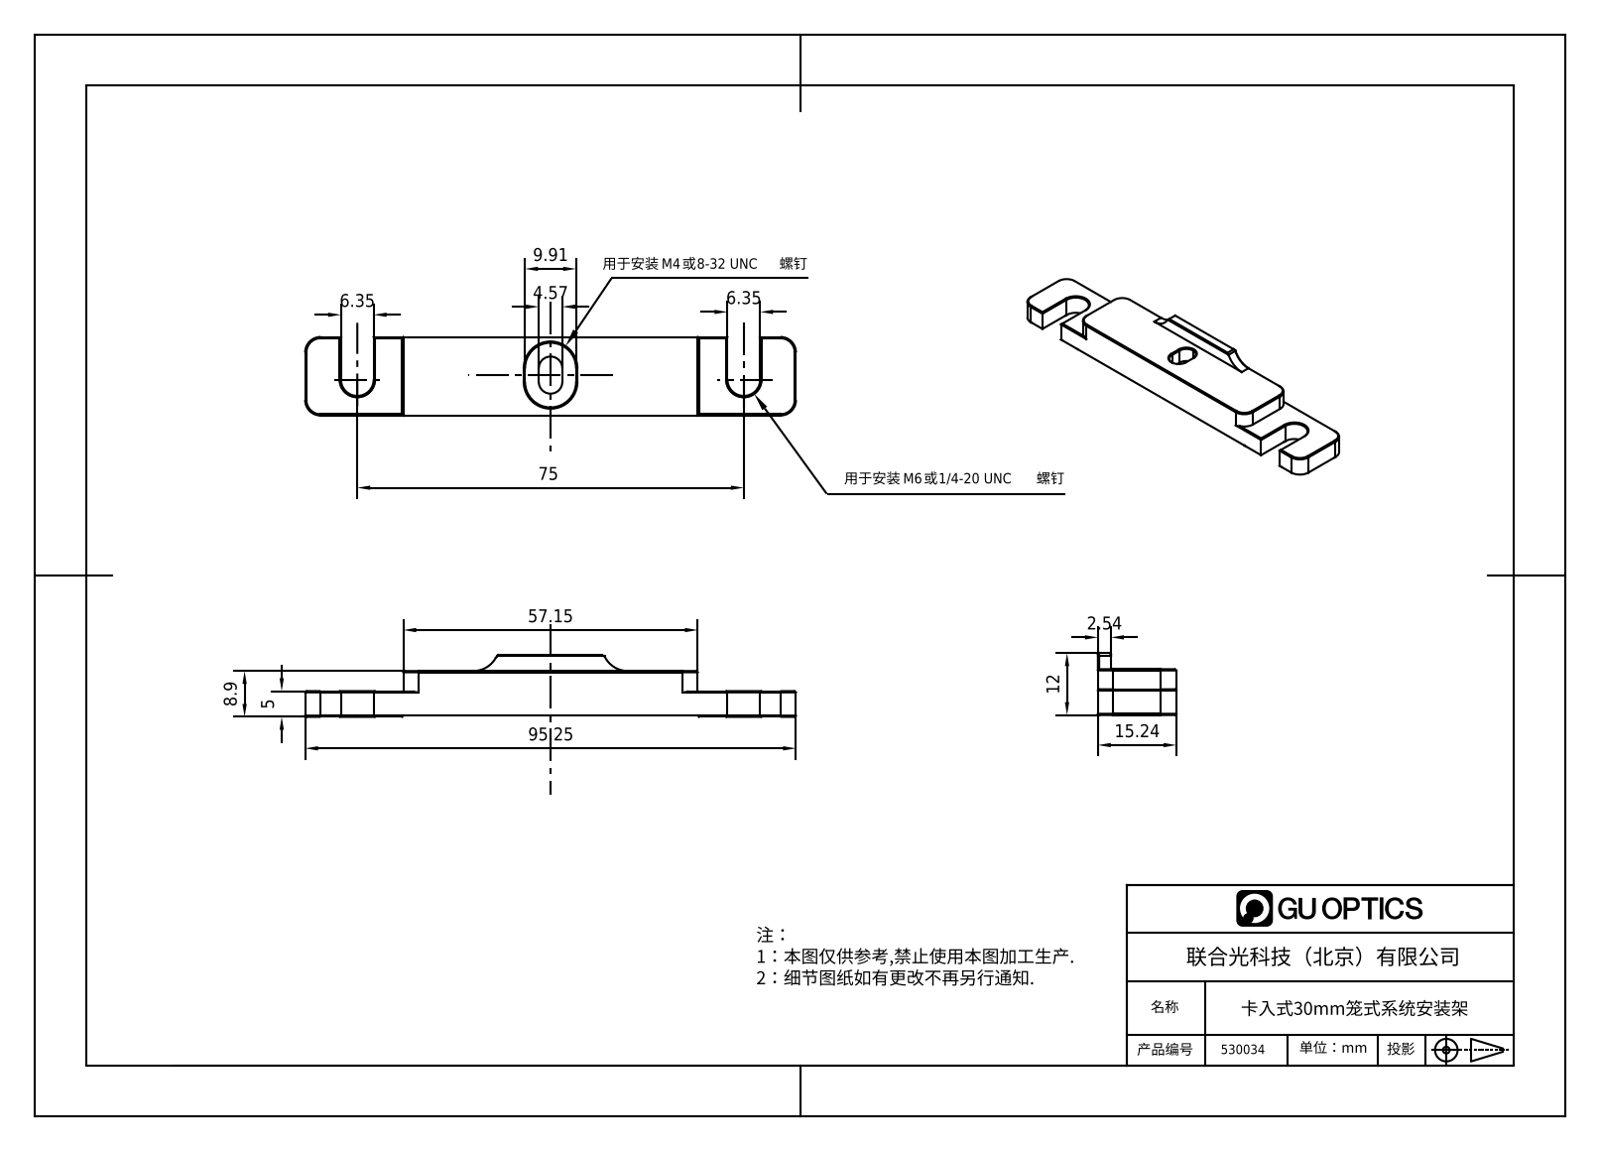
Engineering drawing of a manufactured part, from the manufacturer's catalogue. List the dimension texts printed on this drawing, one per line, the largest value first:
95.25
75
57.15
15.24
12
9.91
8.9
6.35
6.35
5
4.57
2.54
